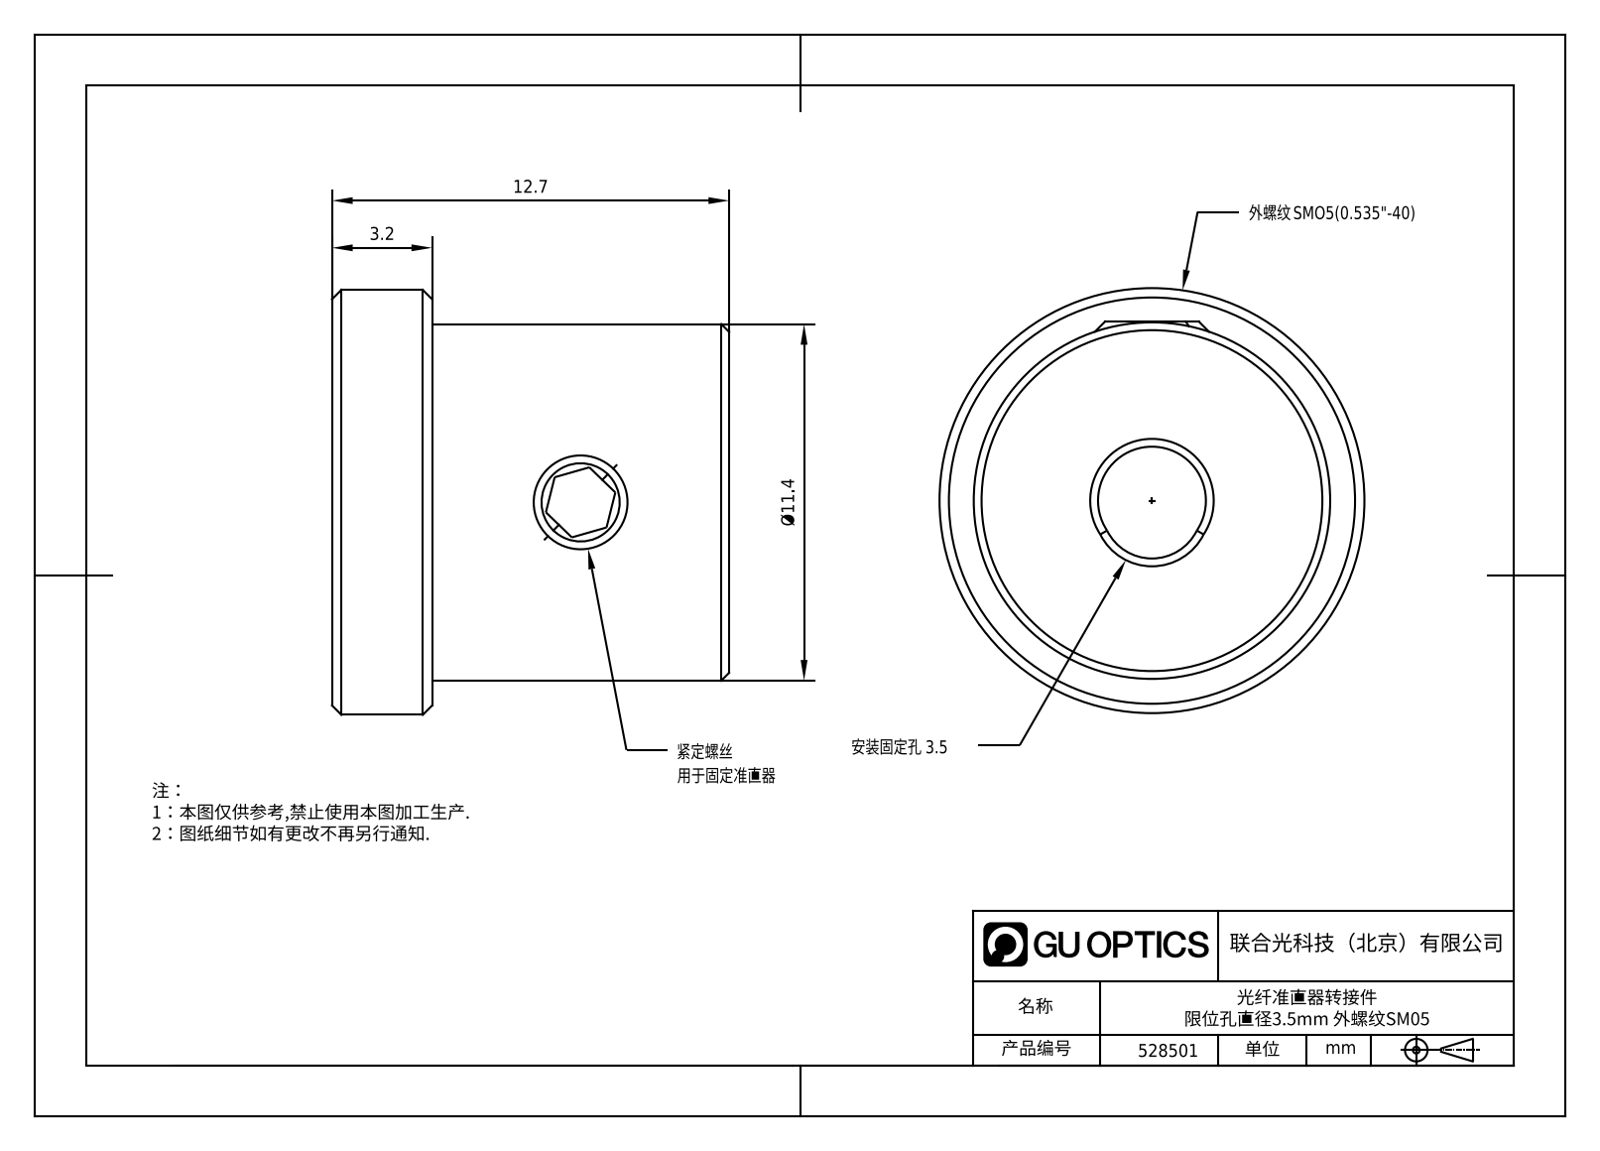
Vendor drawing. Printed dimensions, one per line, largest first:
12.7
Ø11.4
3.2
